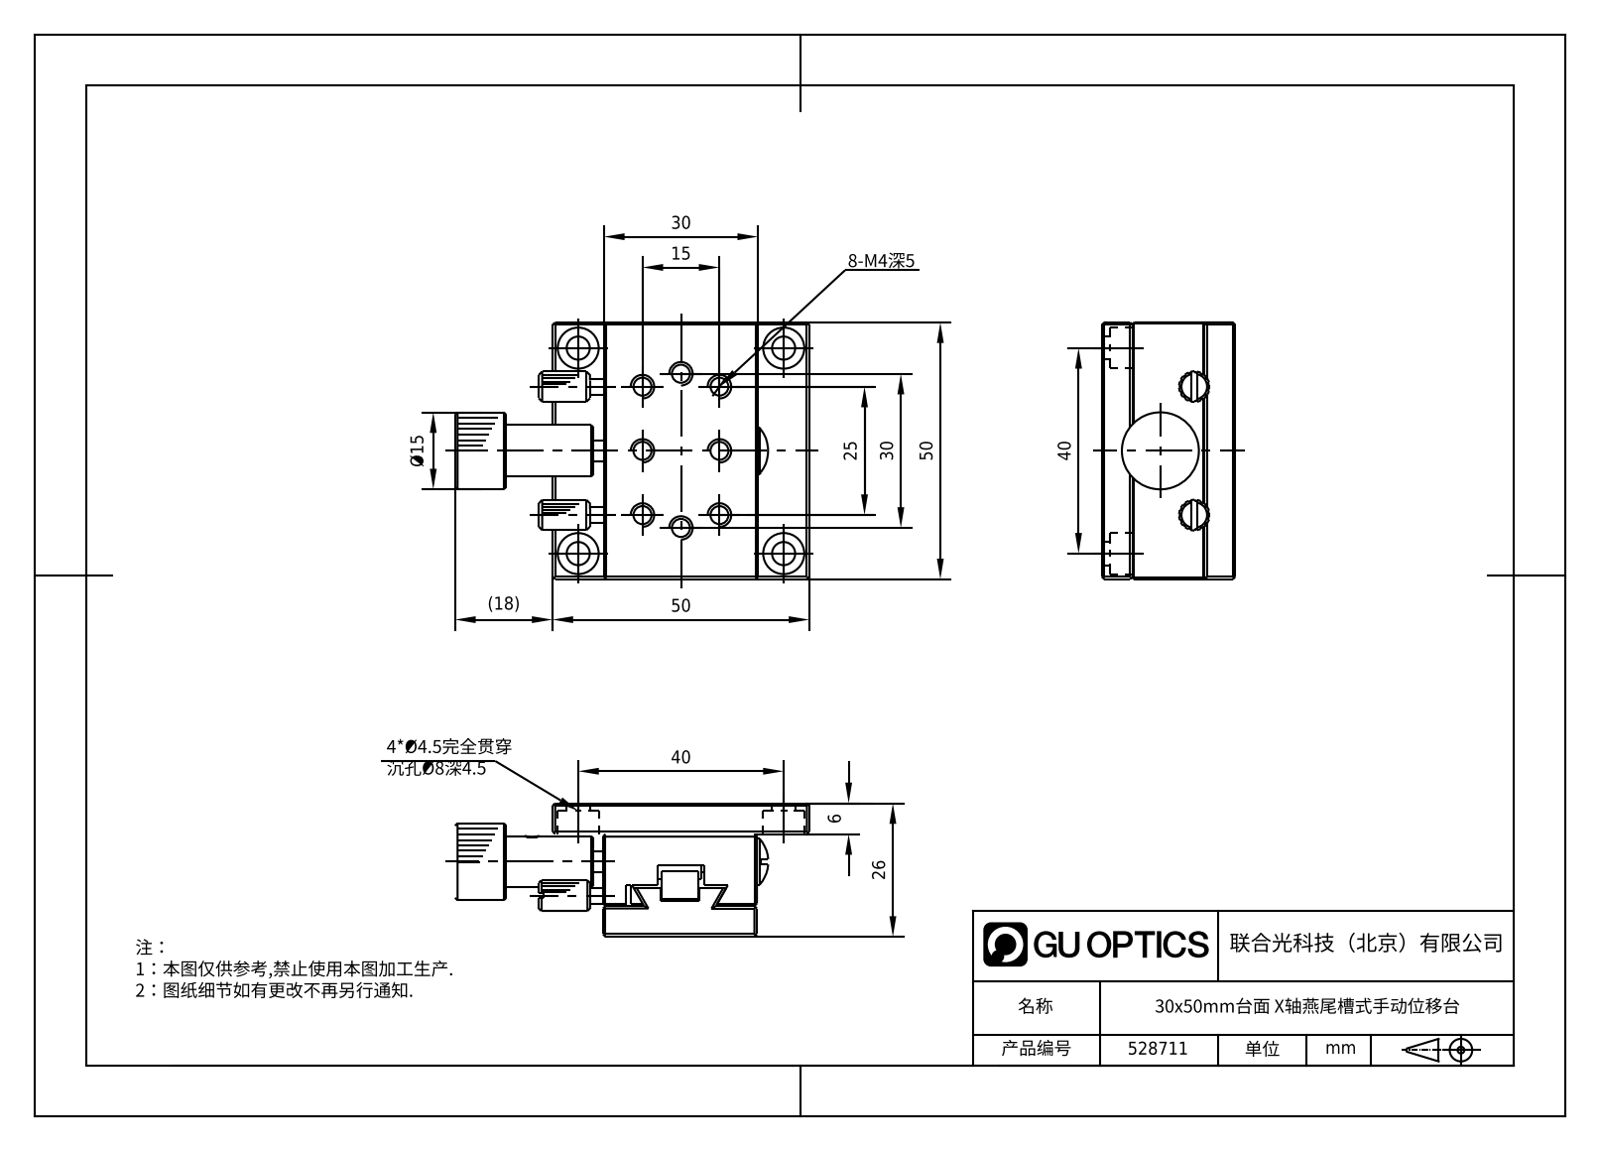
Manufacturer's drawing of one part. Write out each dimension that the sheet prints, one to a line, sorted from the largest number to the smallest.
50
50
40
40
30
30
26
25
(18)
15
Ø15
6
